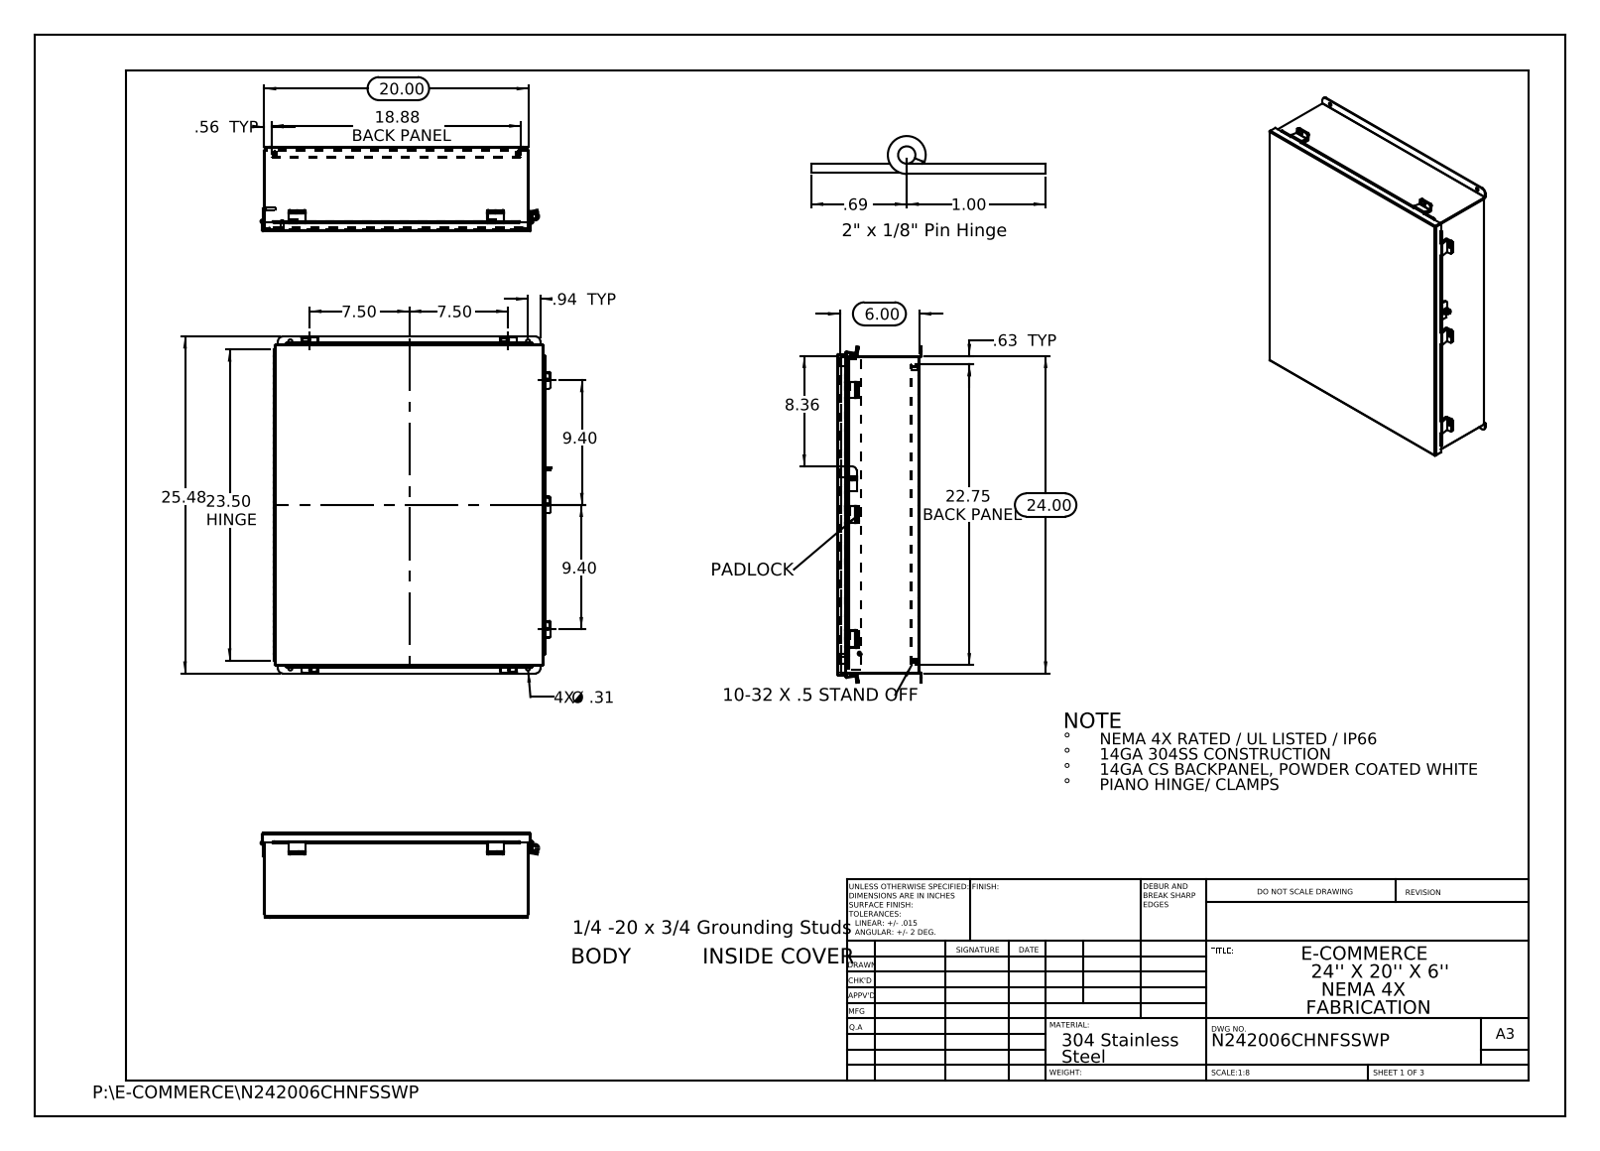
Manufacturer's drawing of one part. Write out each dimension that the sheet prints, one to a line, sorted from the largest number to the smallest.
25.48
24.00
23.50 HINGE
22.75 BACK PANEL
20.00
18.88 BACK PANEL
9.40
9.40
8.36
7.50
7.50
6.00
1.00
.94 TYP
.69
.63 TYP
.56 TYP
4X Ø .31
